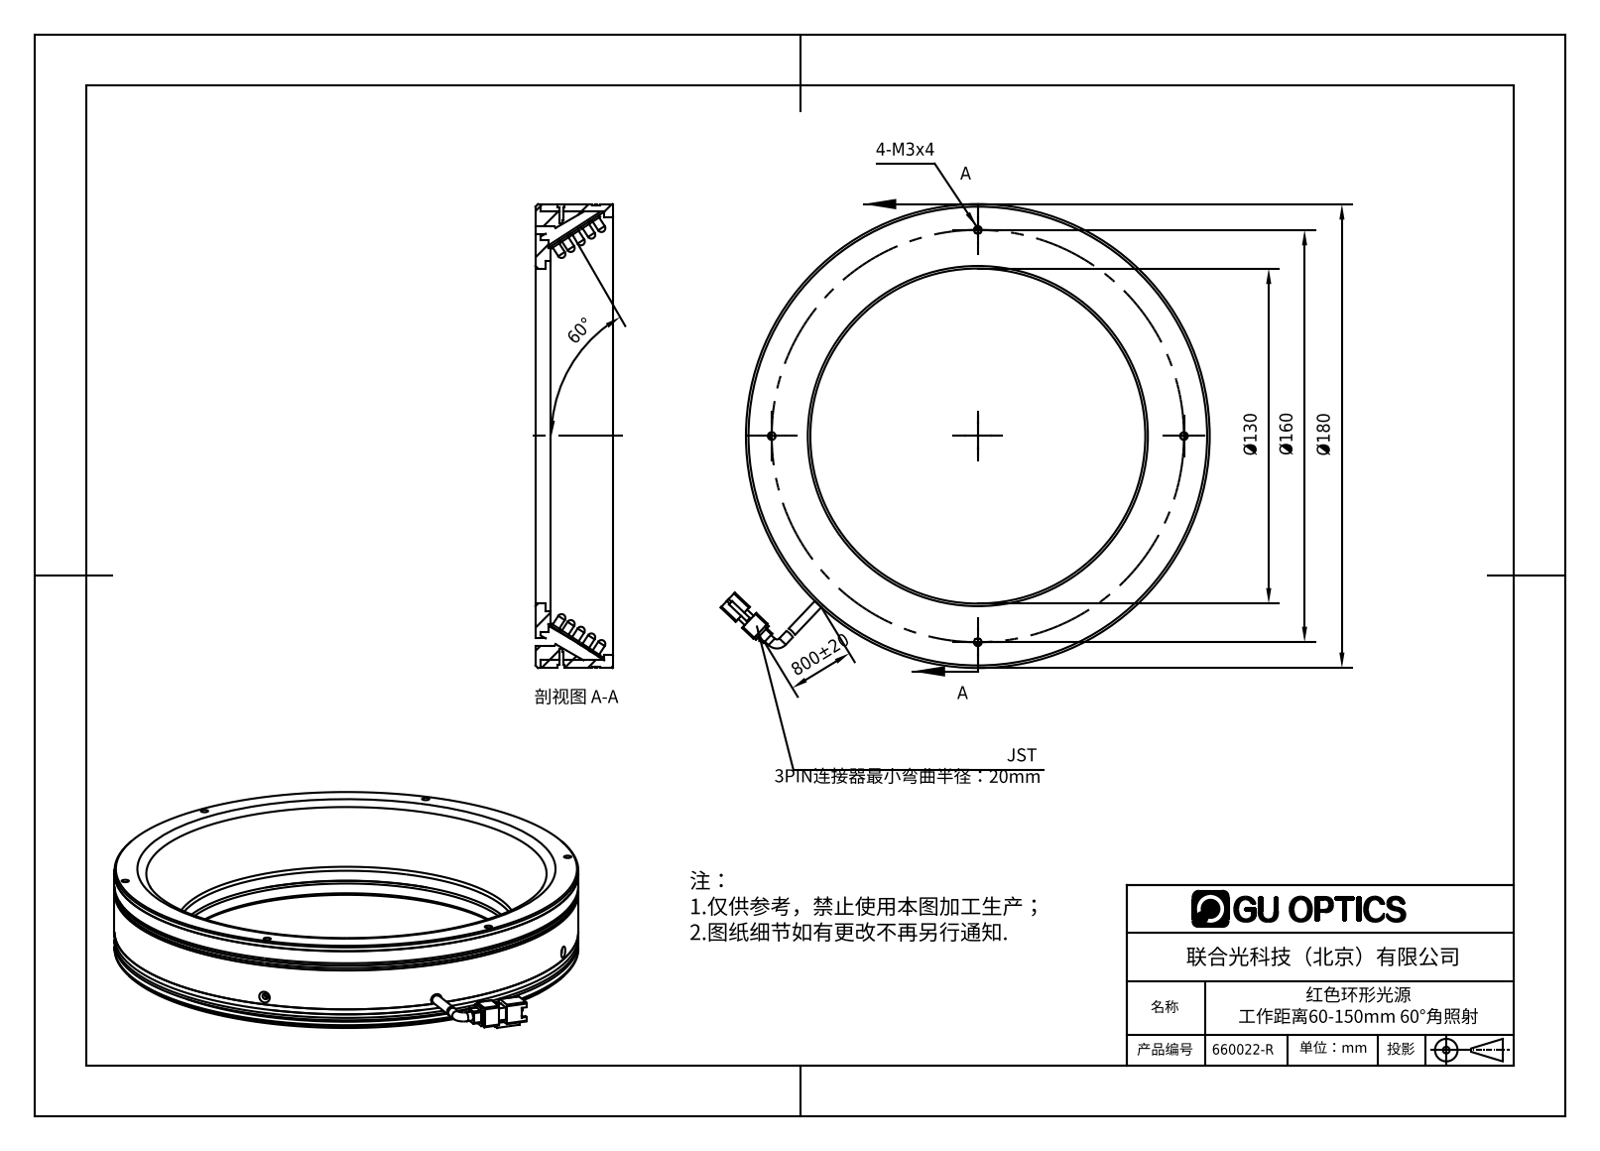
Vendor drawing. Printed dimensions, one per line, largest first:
800±20
Ø180
Ø160
Ø130
60°
